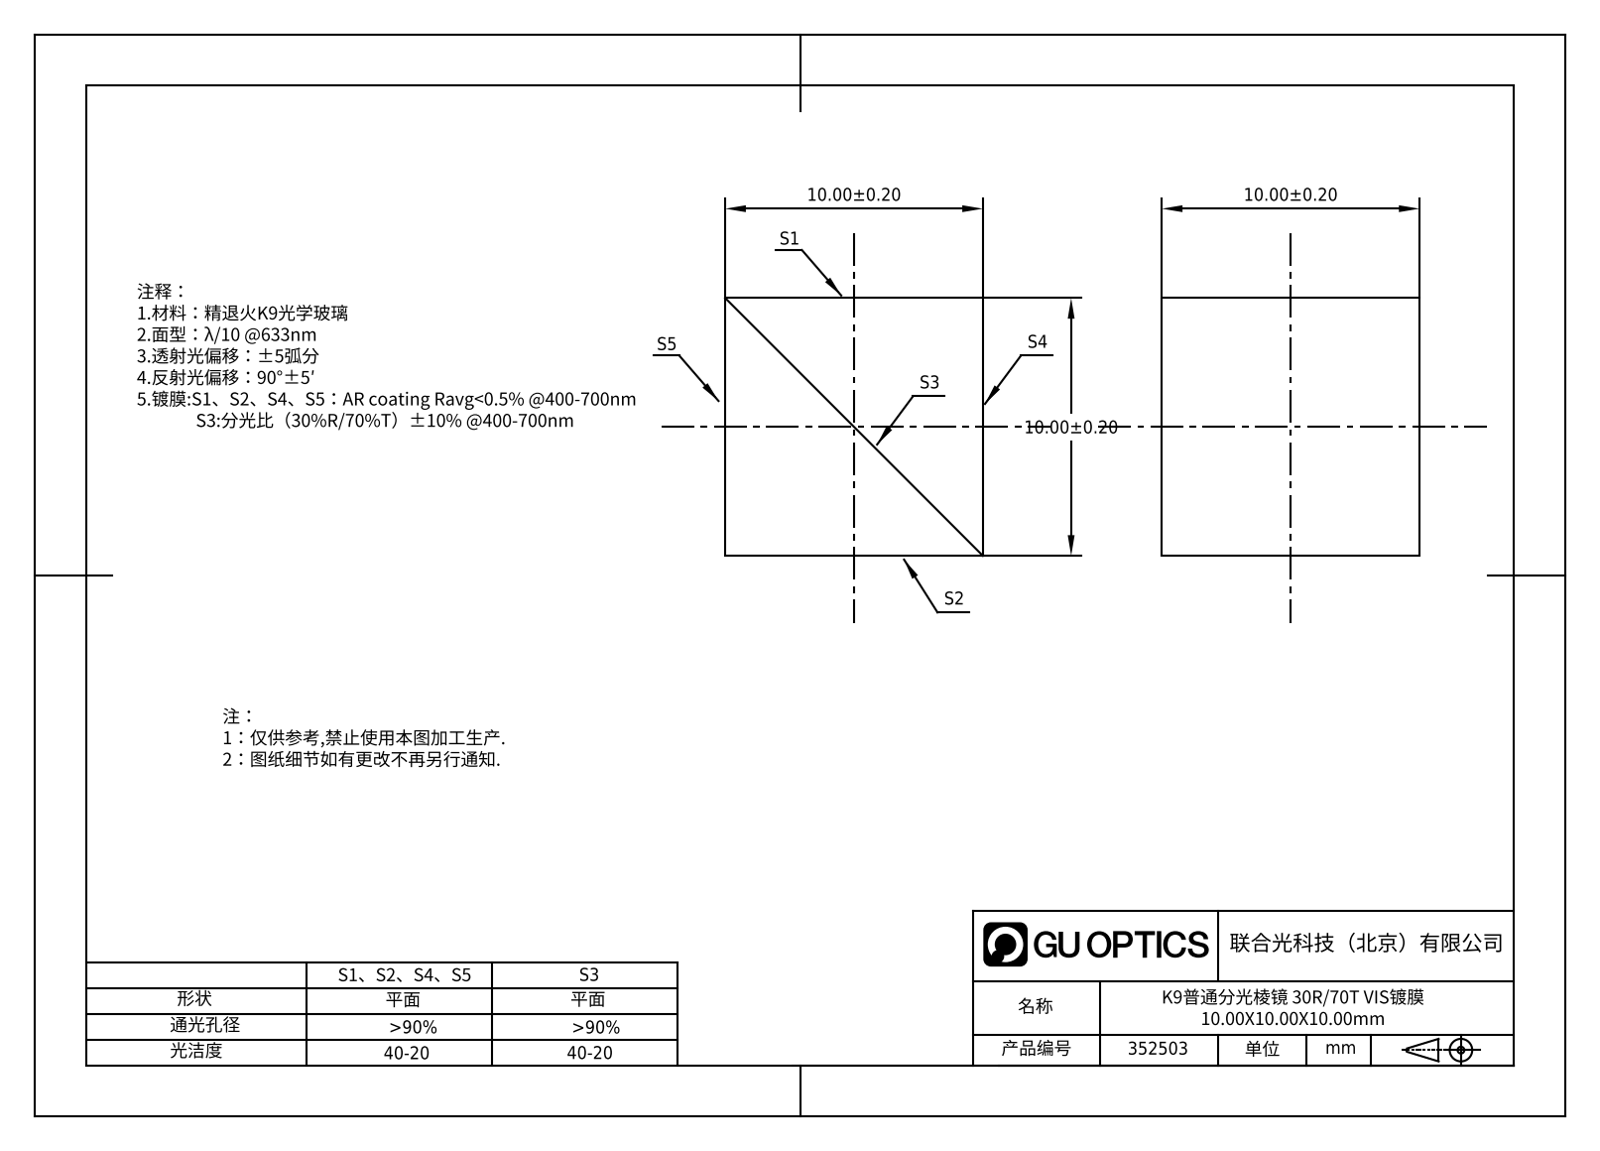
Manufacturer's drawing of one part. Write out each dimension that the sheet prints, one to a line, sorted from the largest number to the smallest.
10.00±0.20
10.00±0.20
10.00±0.20
